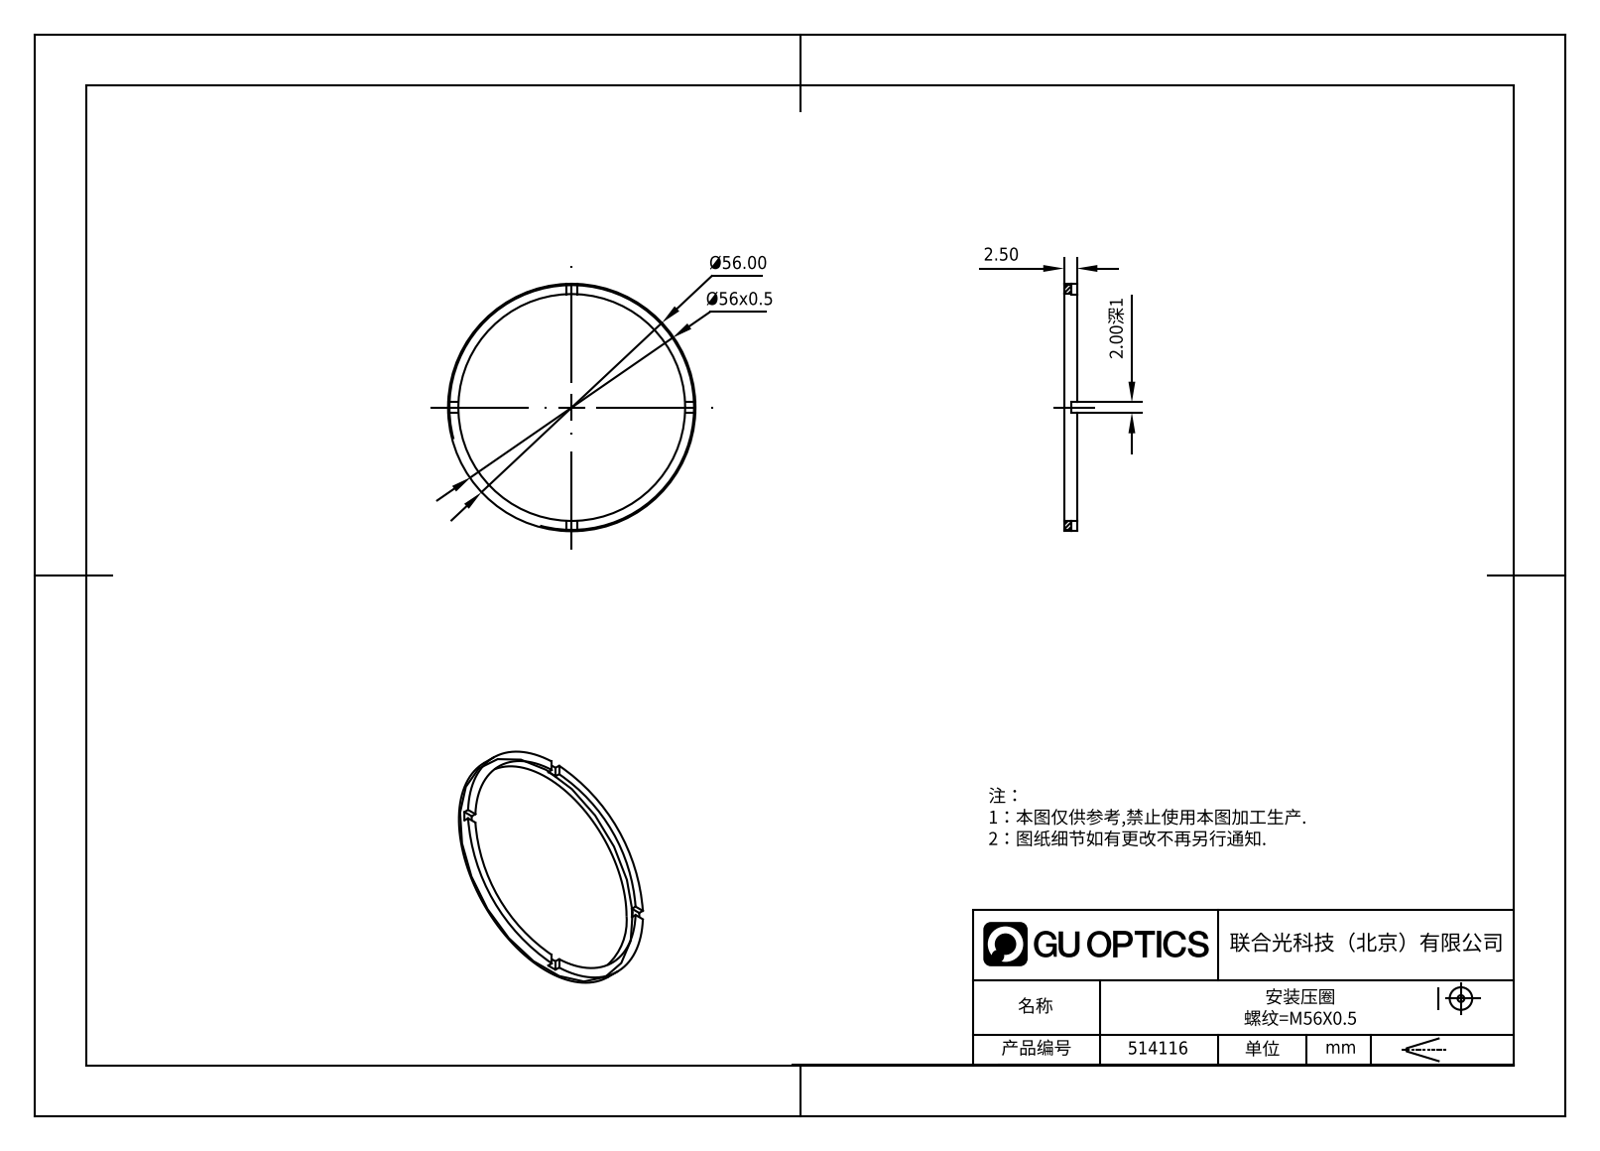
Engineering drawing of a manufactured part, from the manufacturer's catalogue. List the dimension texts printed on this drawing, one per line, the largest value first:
Ø56.00
Ø56x0.5
2.50
2.00深1
